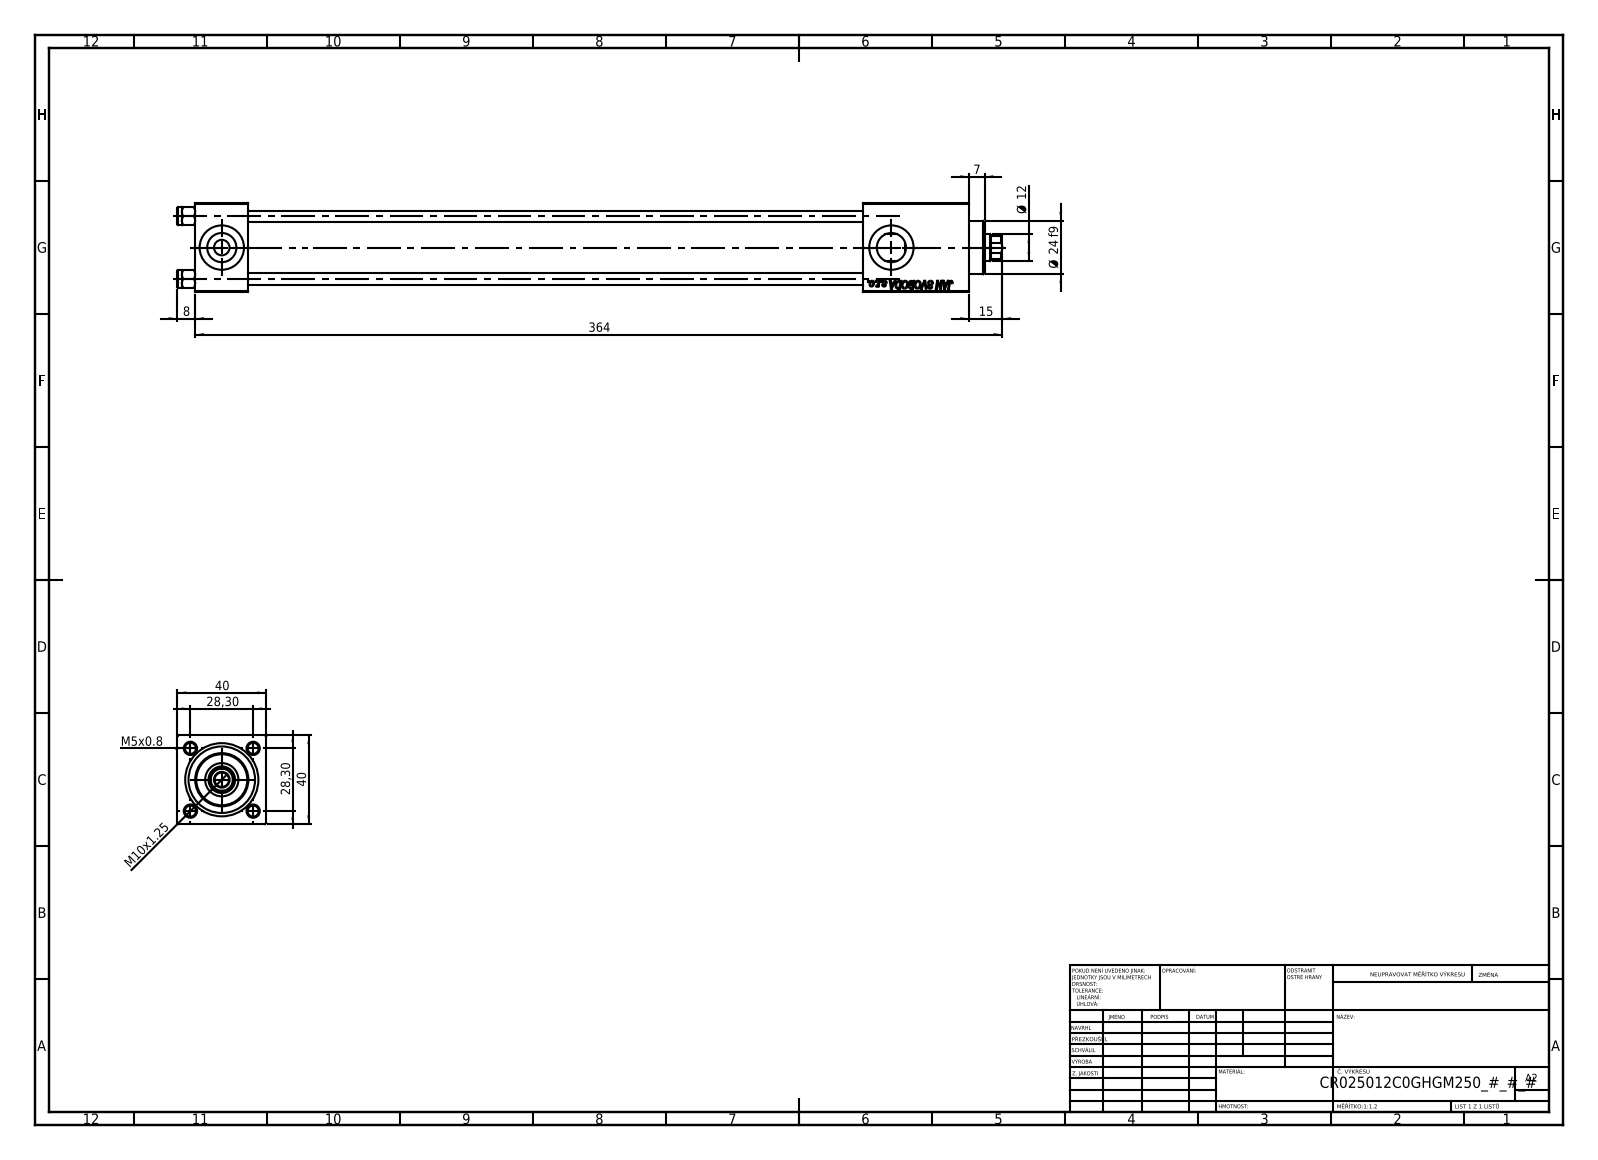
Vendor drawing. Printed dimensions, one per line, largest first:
364
40
40
28,30
28,30
Ø 24 f9
15
Ø 12
M10x1.25
8
7
M5x0.8
